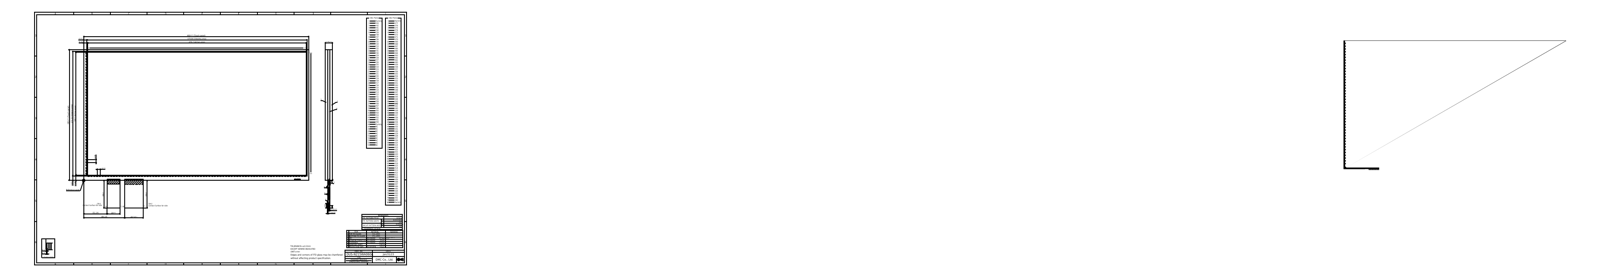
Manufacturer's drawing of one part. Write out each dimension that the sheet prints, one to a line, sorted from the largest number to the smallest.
490±0.5 (Touch panel)
479.84 (Viewing area)
476.7 (Active area)
285±0.5 (Touch panel)
271.31 (Viewing area)
268.1 (Active area)
(89.14)
60±1
60±1
(51.14)
40.5±0.1
28±0.1
11.44
(10)
9.83
8.14
6.57
6.11
6.09
5
2.35±0.2
0.5
0.3±0.03
0.3±0.03
0.3
